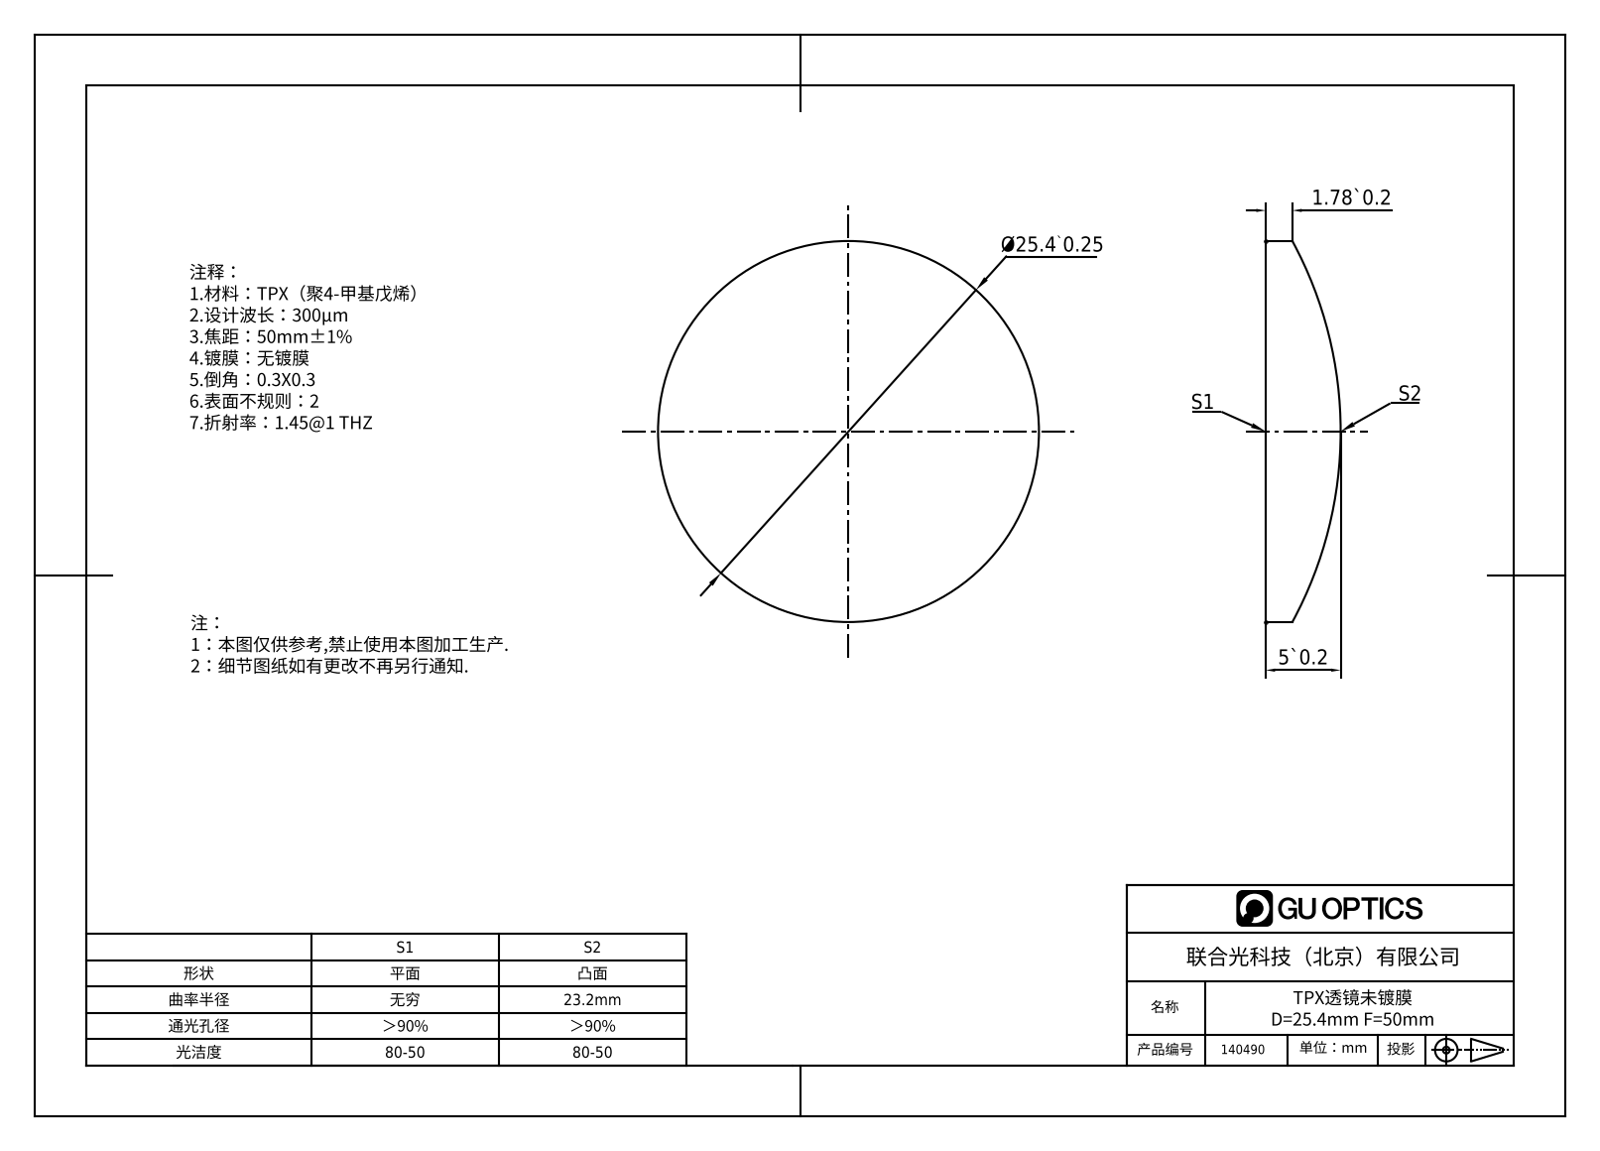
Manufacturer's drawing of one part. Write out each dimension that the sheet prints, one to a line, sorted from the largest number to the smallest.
Ø25.4`0.25
5`0.2
1.78`0.2
